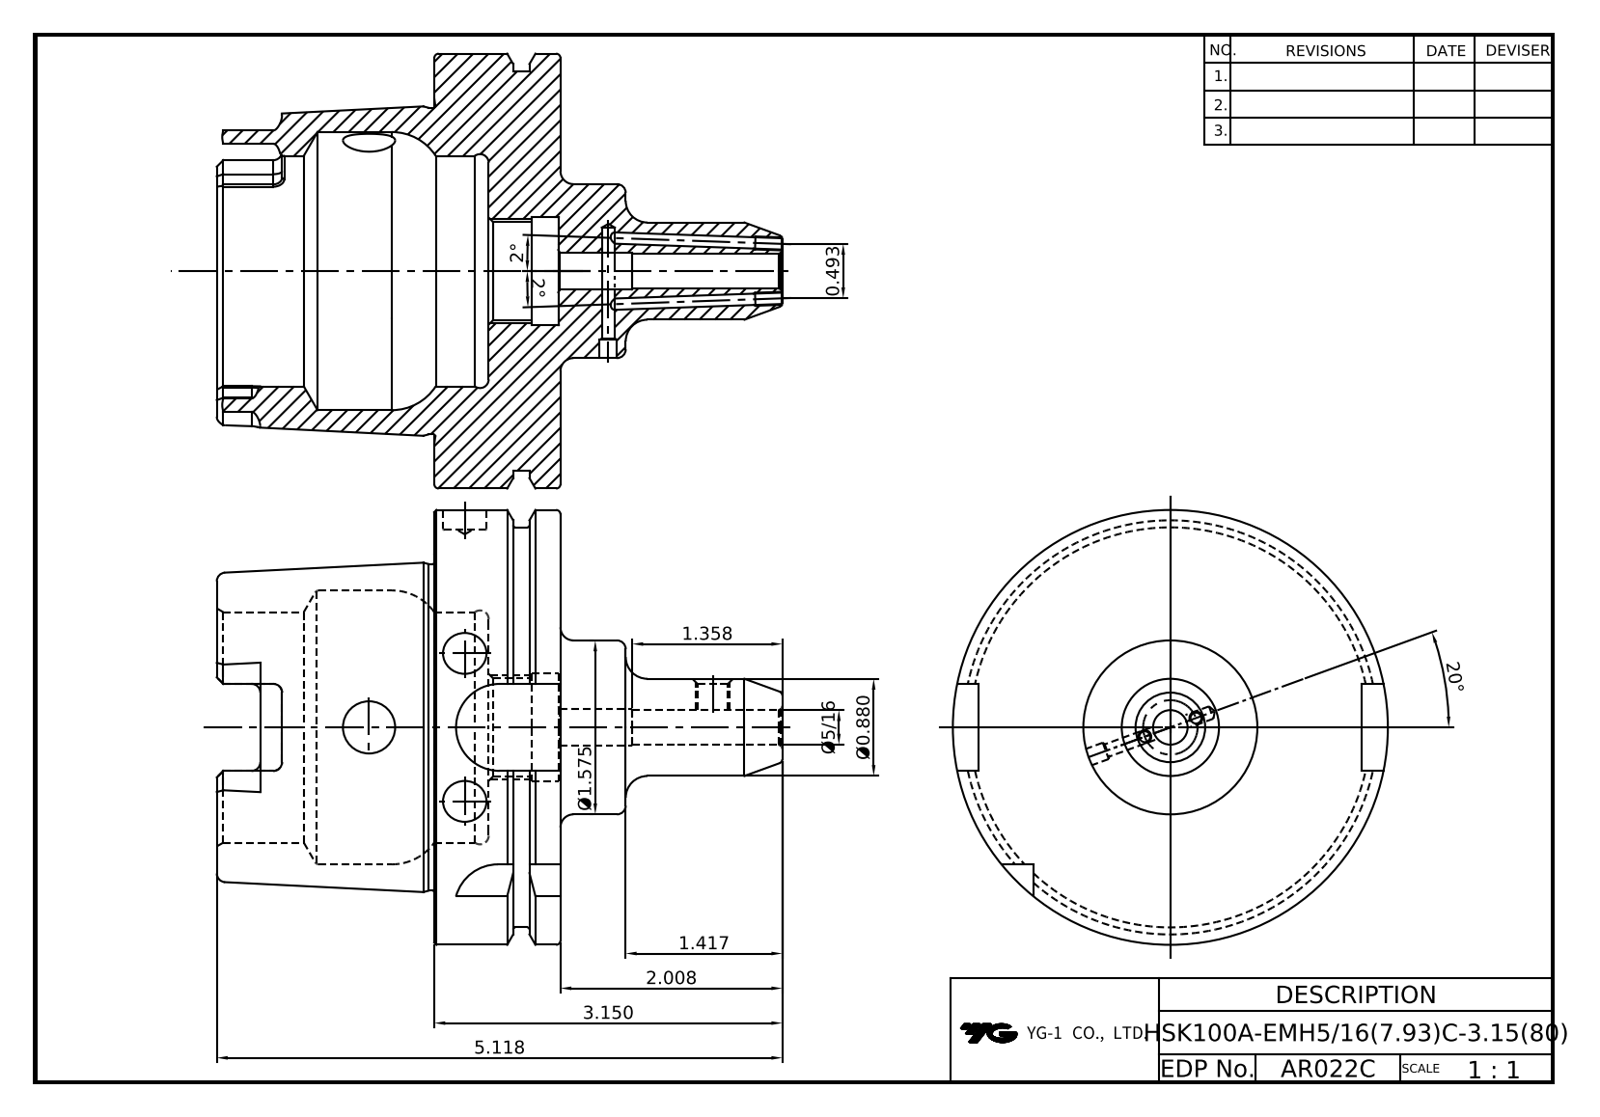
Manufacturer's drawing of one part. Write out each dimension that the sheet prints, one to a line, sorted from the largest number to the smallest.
20°
5.118
3.150
2.008
2°
2°
Ø1.575
1.417
1.358
Ø0.880
0.493
Ø5/16
